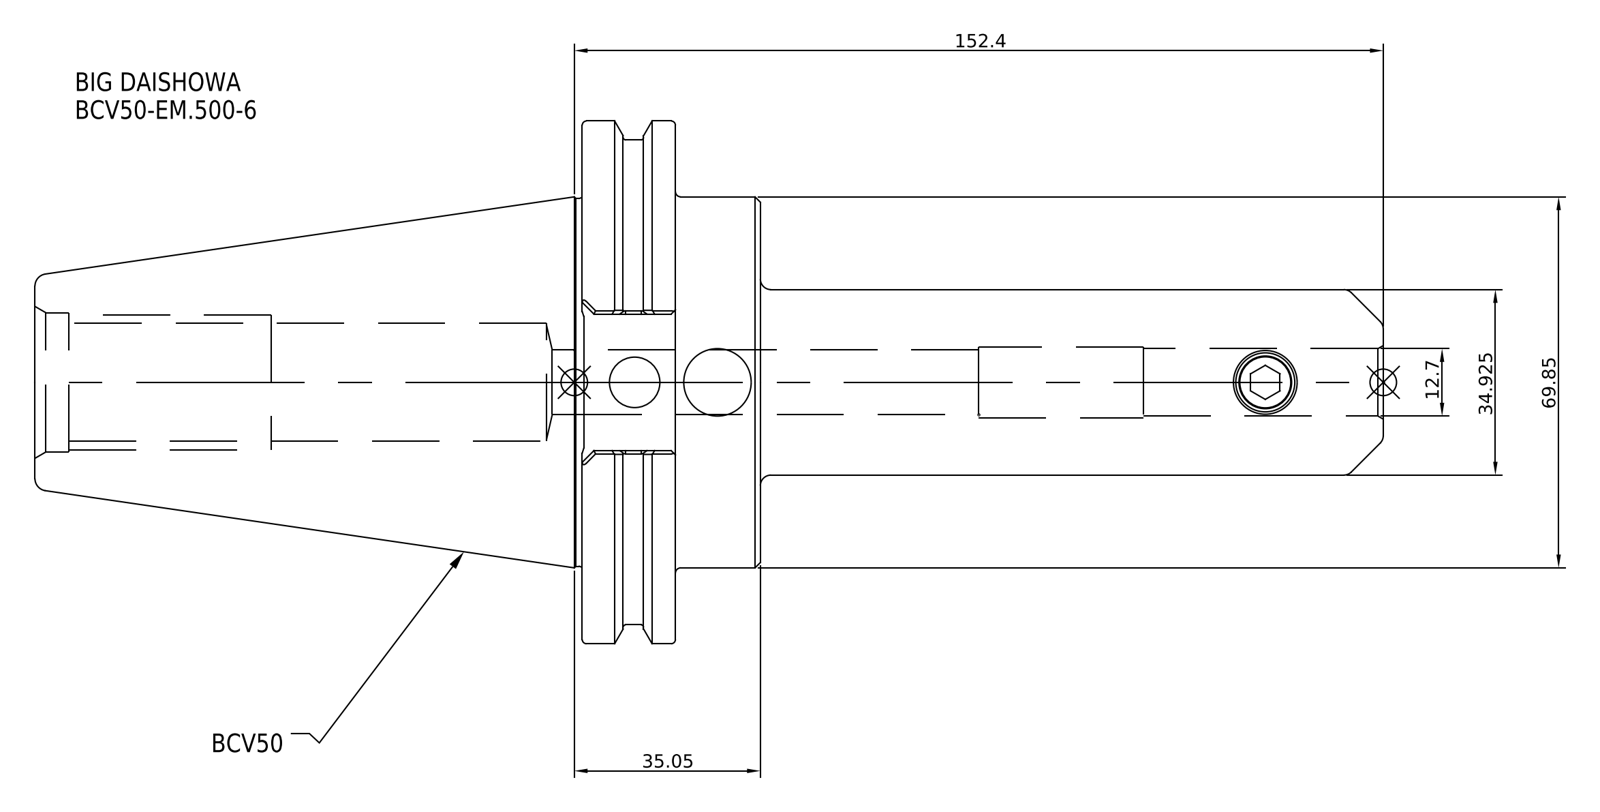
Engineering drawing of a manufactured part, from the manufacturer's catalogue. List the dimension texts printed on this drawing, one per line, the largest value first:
152.4
69.85
35.05
34.925
12.7
